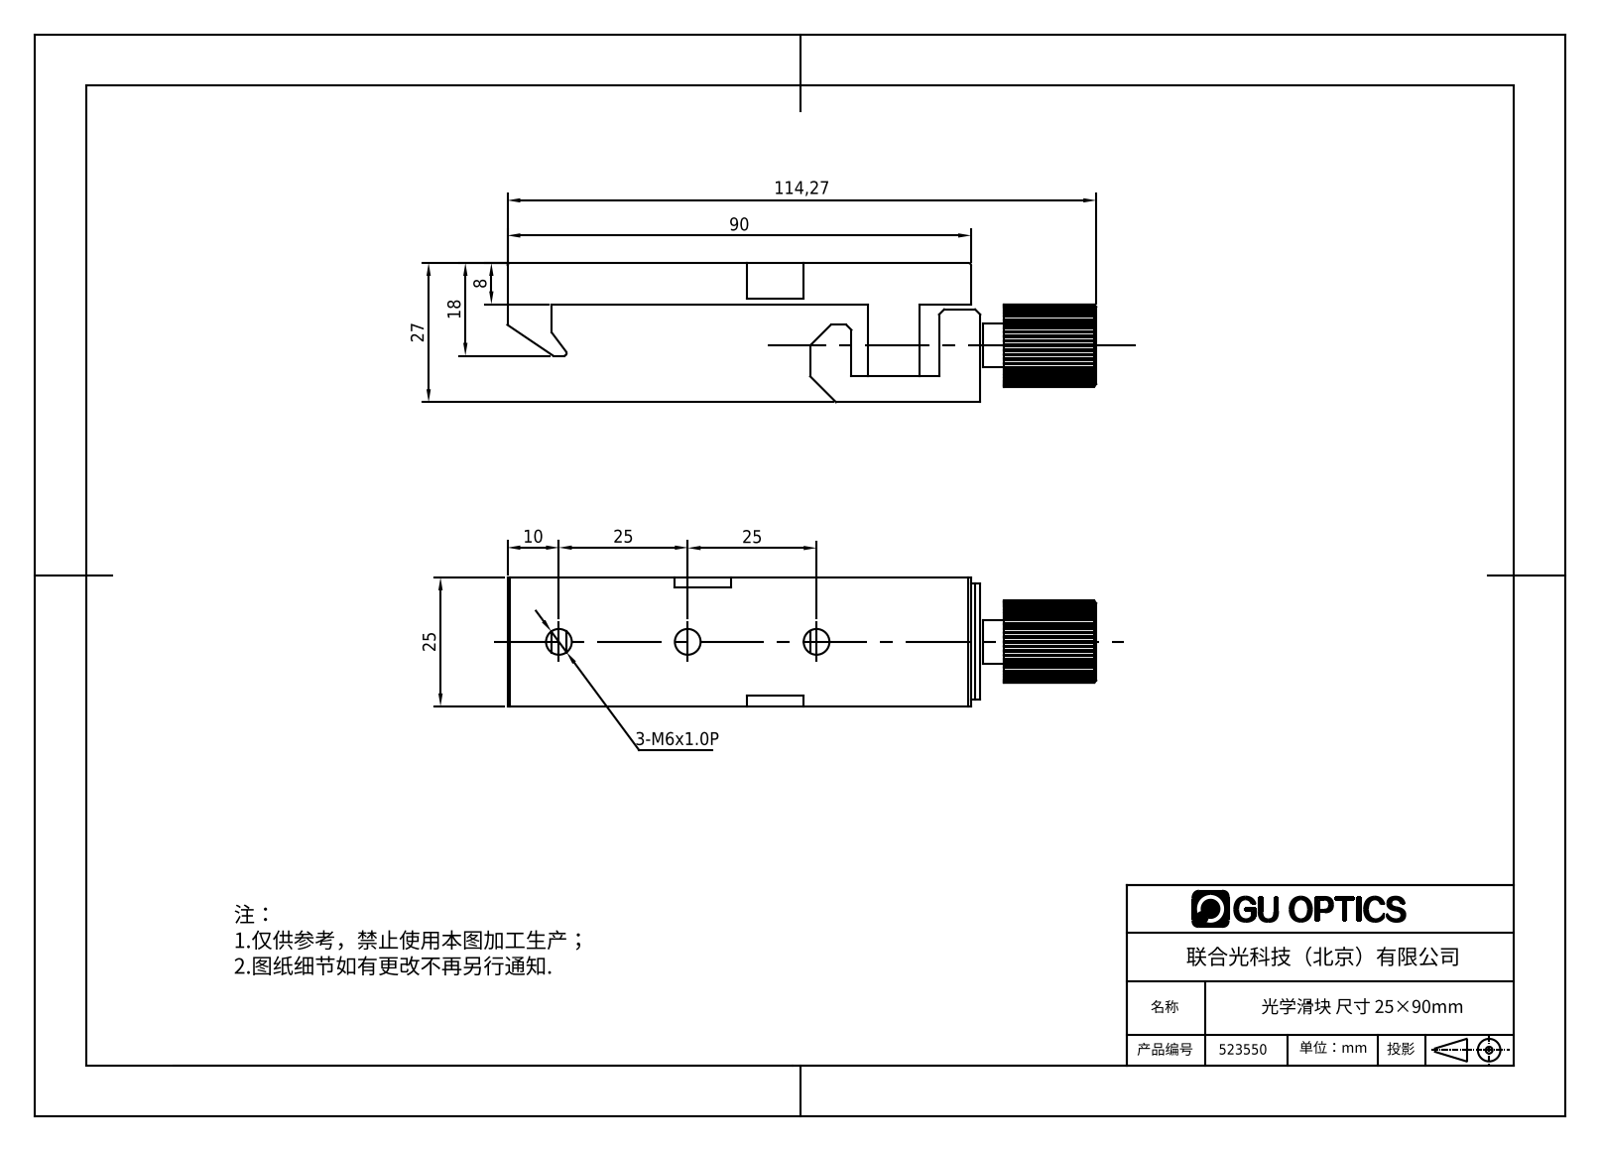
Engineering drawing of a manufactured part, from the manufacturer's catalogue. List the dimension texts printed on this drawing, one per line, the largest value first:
114,27
90
27
25
25
25
18
10
8
3-M6x1.0P
